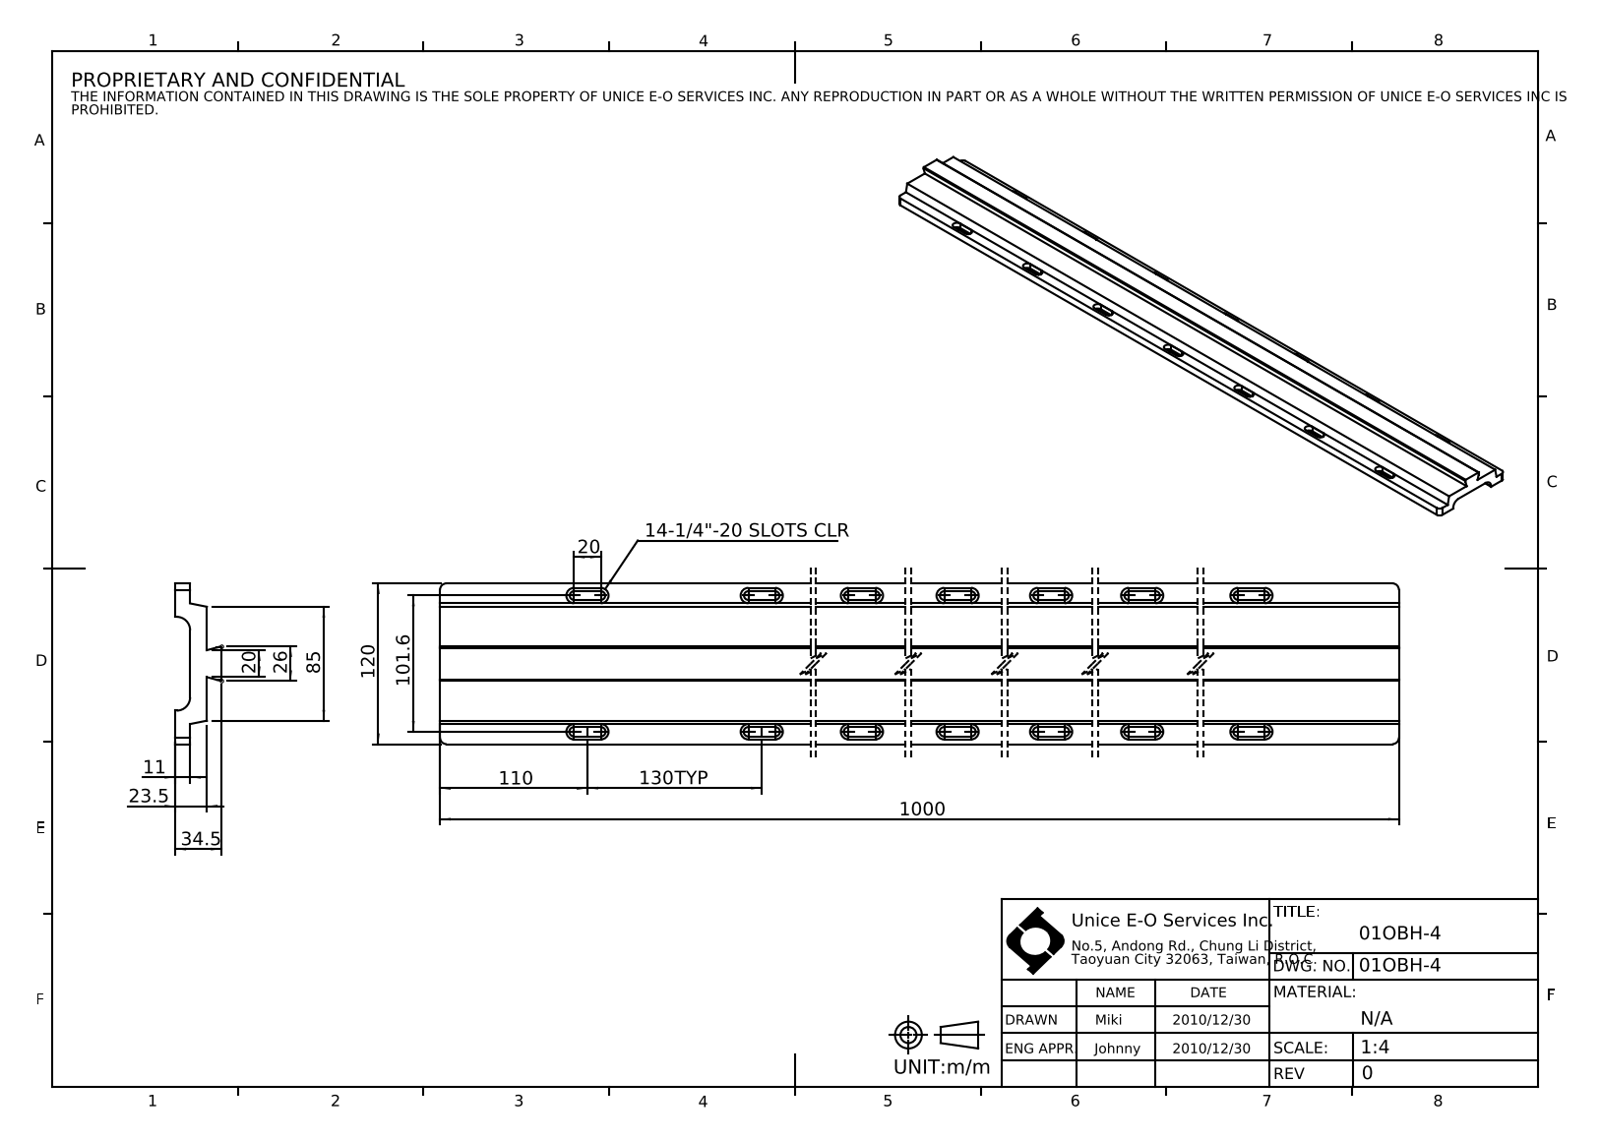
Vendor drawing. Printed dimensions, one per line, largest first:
1000
130 TYP
120
110
101.6
85
34.5
26
23.5
20
20
14-1/4"-20 SLOTS CLR
11
